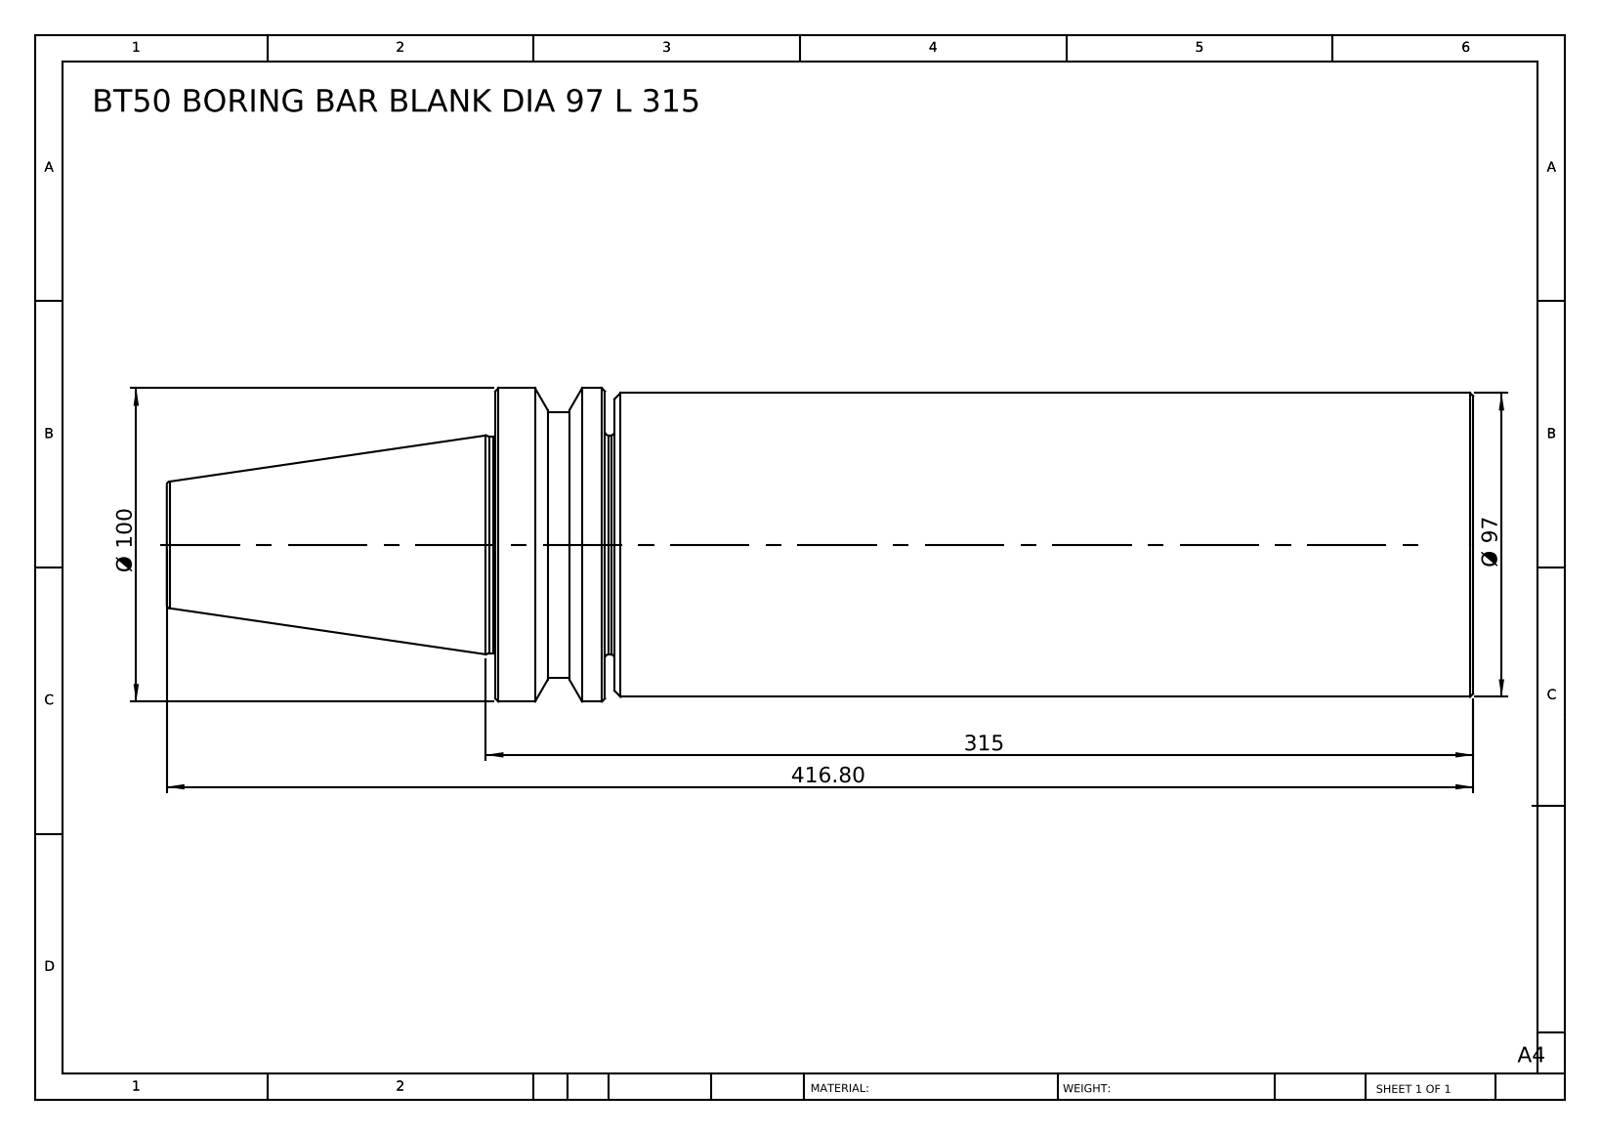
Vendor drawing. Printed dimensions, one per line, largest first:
416.80
315
Ø 100
Ø 97
